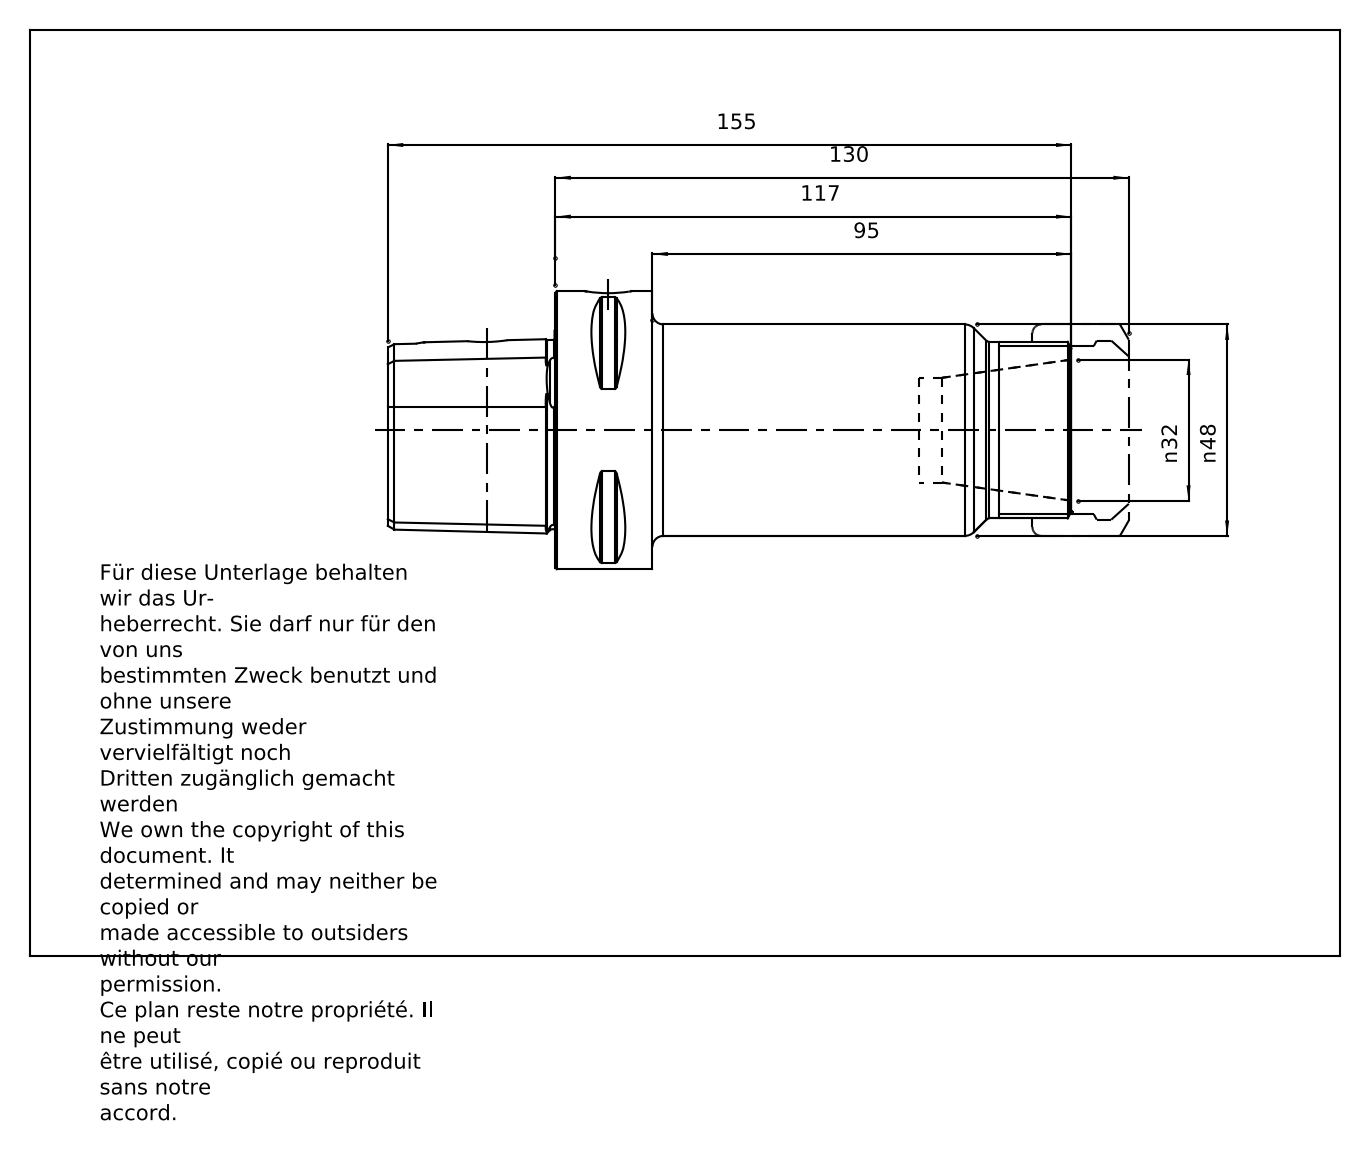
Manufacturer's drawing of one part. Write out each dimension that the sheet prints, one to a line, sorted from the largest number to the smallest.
155
130
117
95
n48
n32
